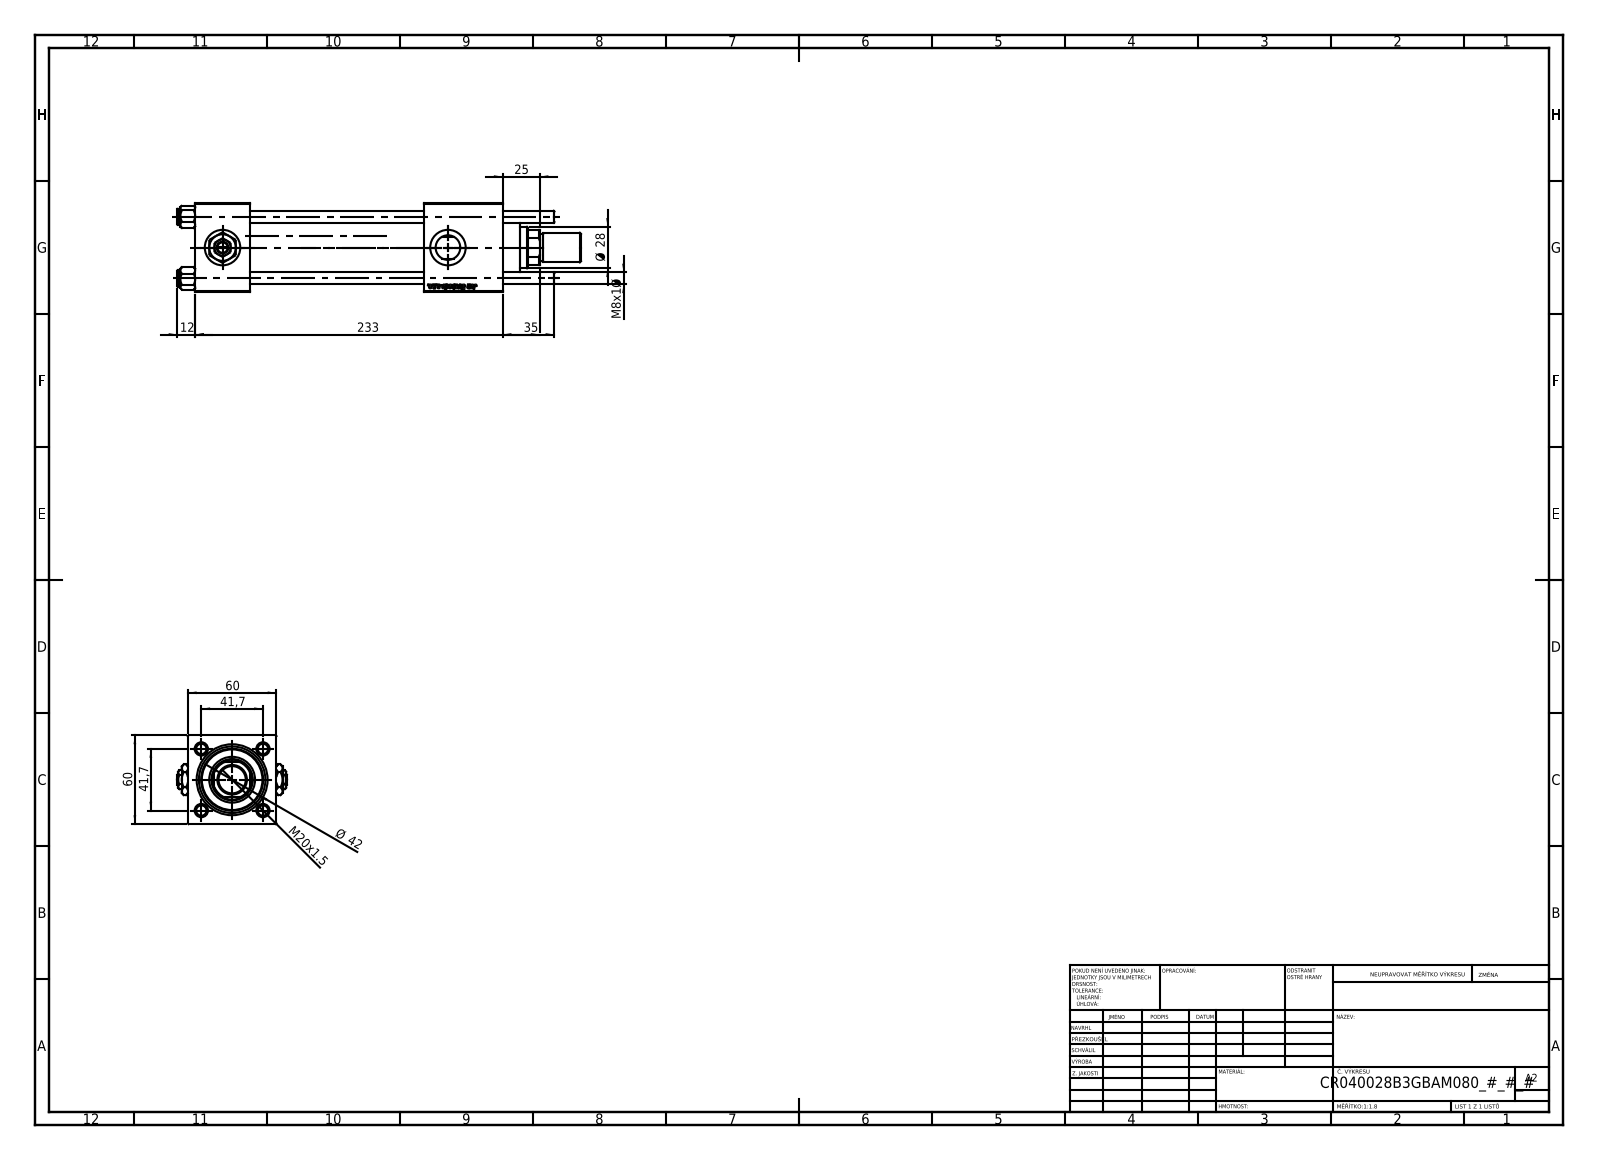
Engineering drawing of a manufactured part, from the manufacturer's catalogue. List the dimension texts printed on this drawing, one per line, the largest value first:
233
60
60
Ø 42
41,7
41,7
35
Ø 28
25
M20x1.5
12
M8x1 Ø
